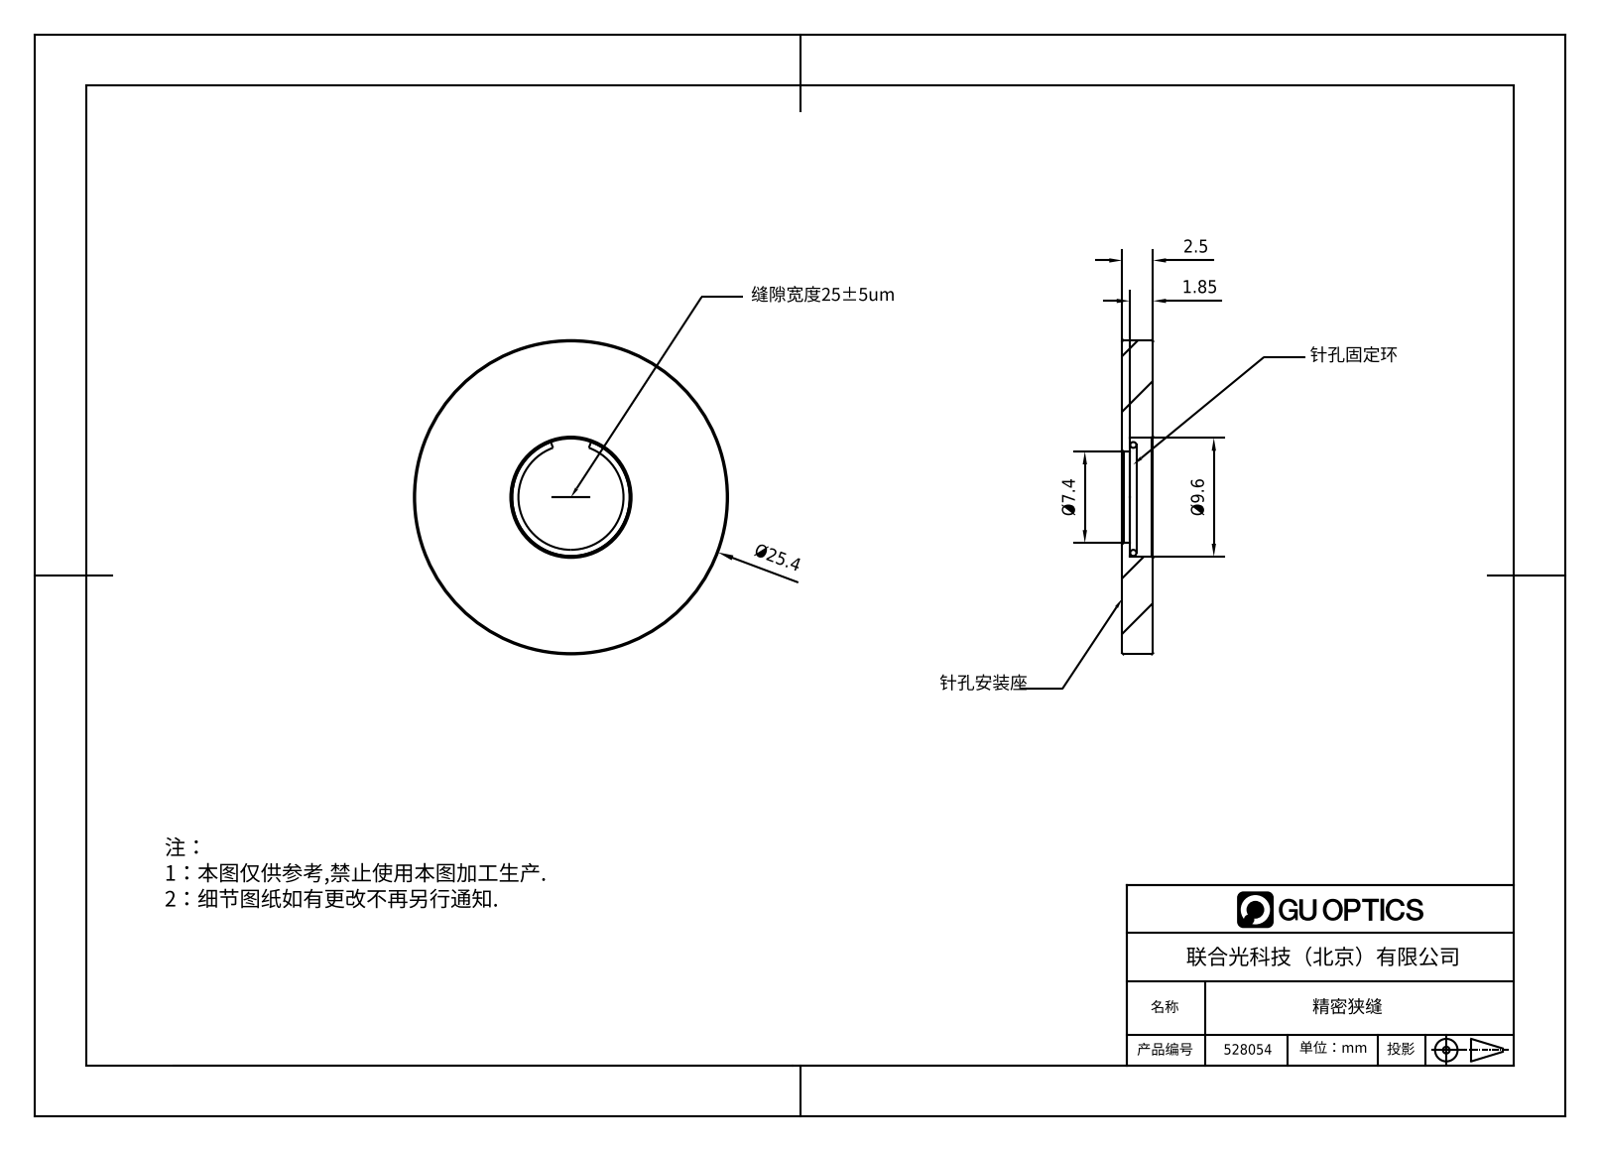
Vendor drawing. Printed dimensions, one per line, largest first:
Ø25.4
Ø9.6
Ø7.4
2.5
1.85
